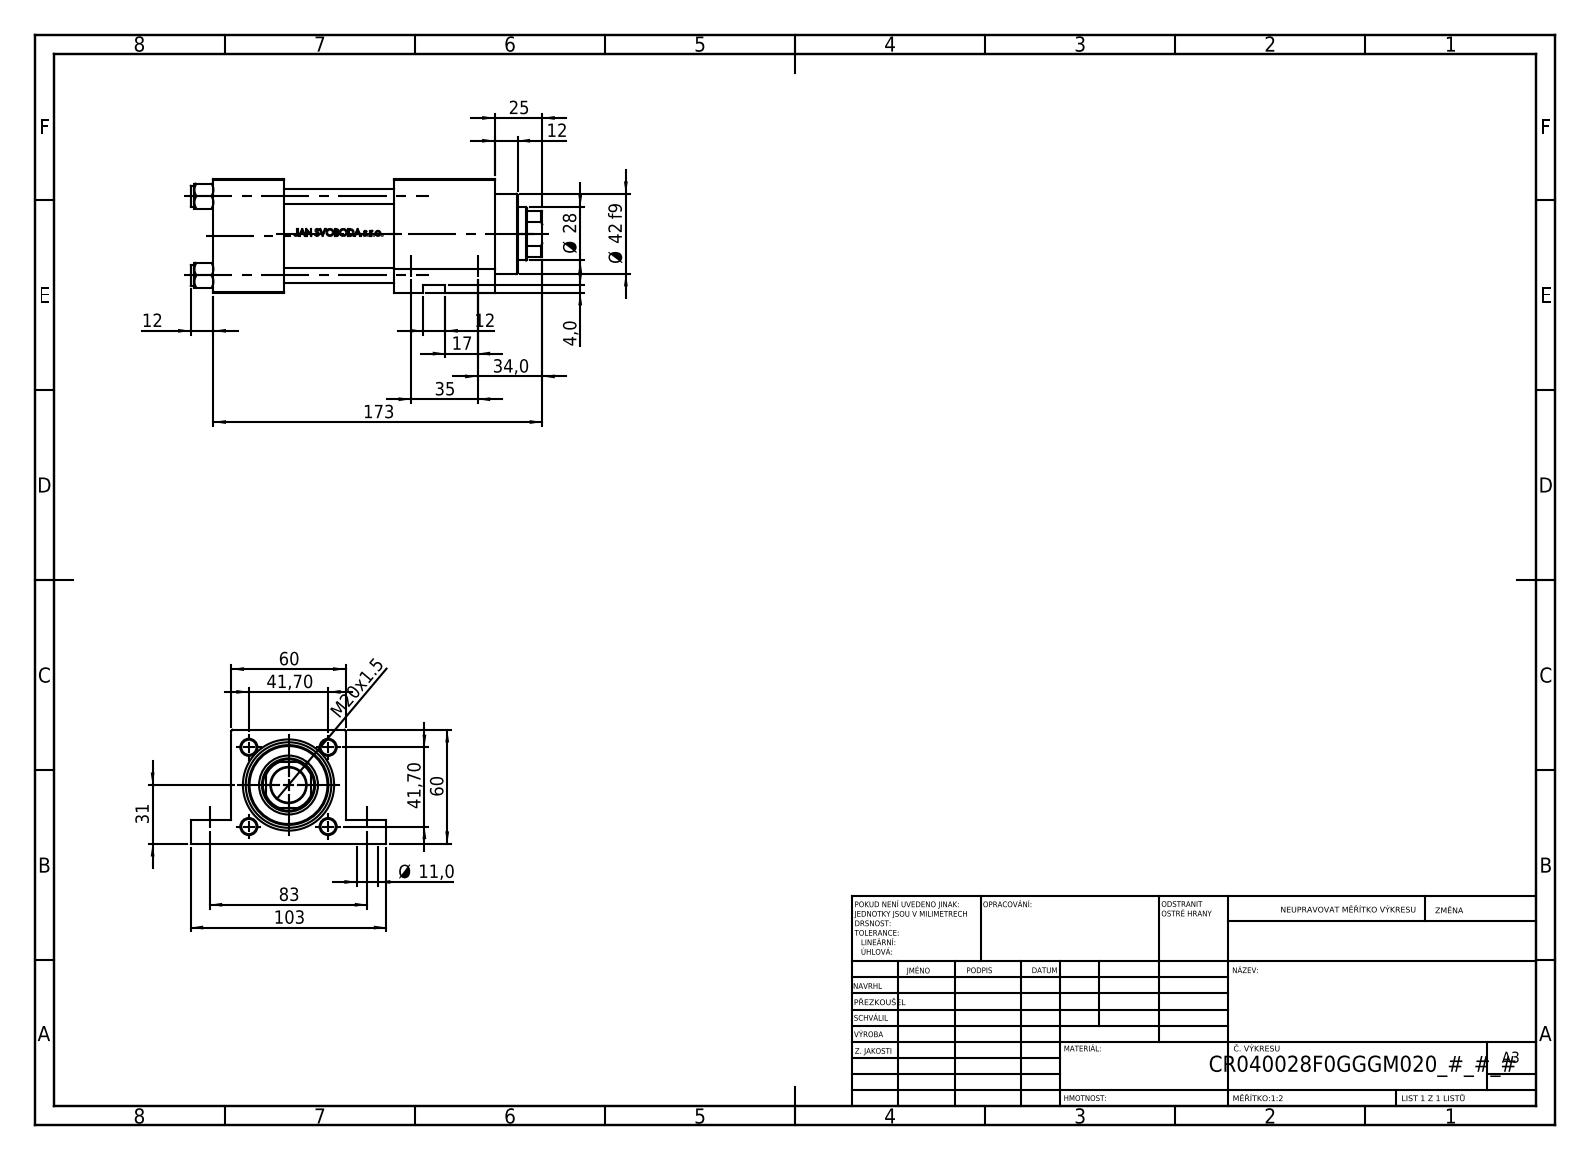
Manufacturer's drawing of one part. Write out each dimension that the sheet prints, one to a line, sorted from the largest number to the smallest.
173
103
83
60
60
Ø 42 f9
41,70
41,70
35
34,0
31
Ø 28
25
M20x1.5
17
12
12
12
Ø 11,0
4,0
